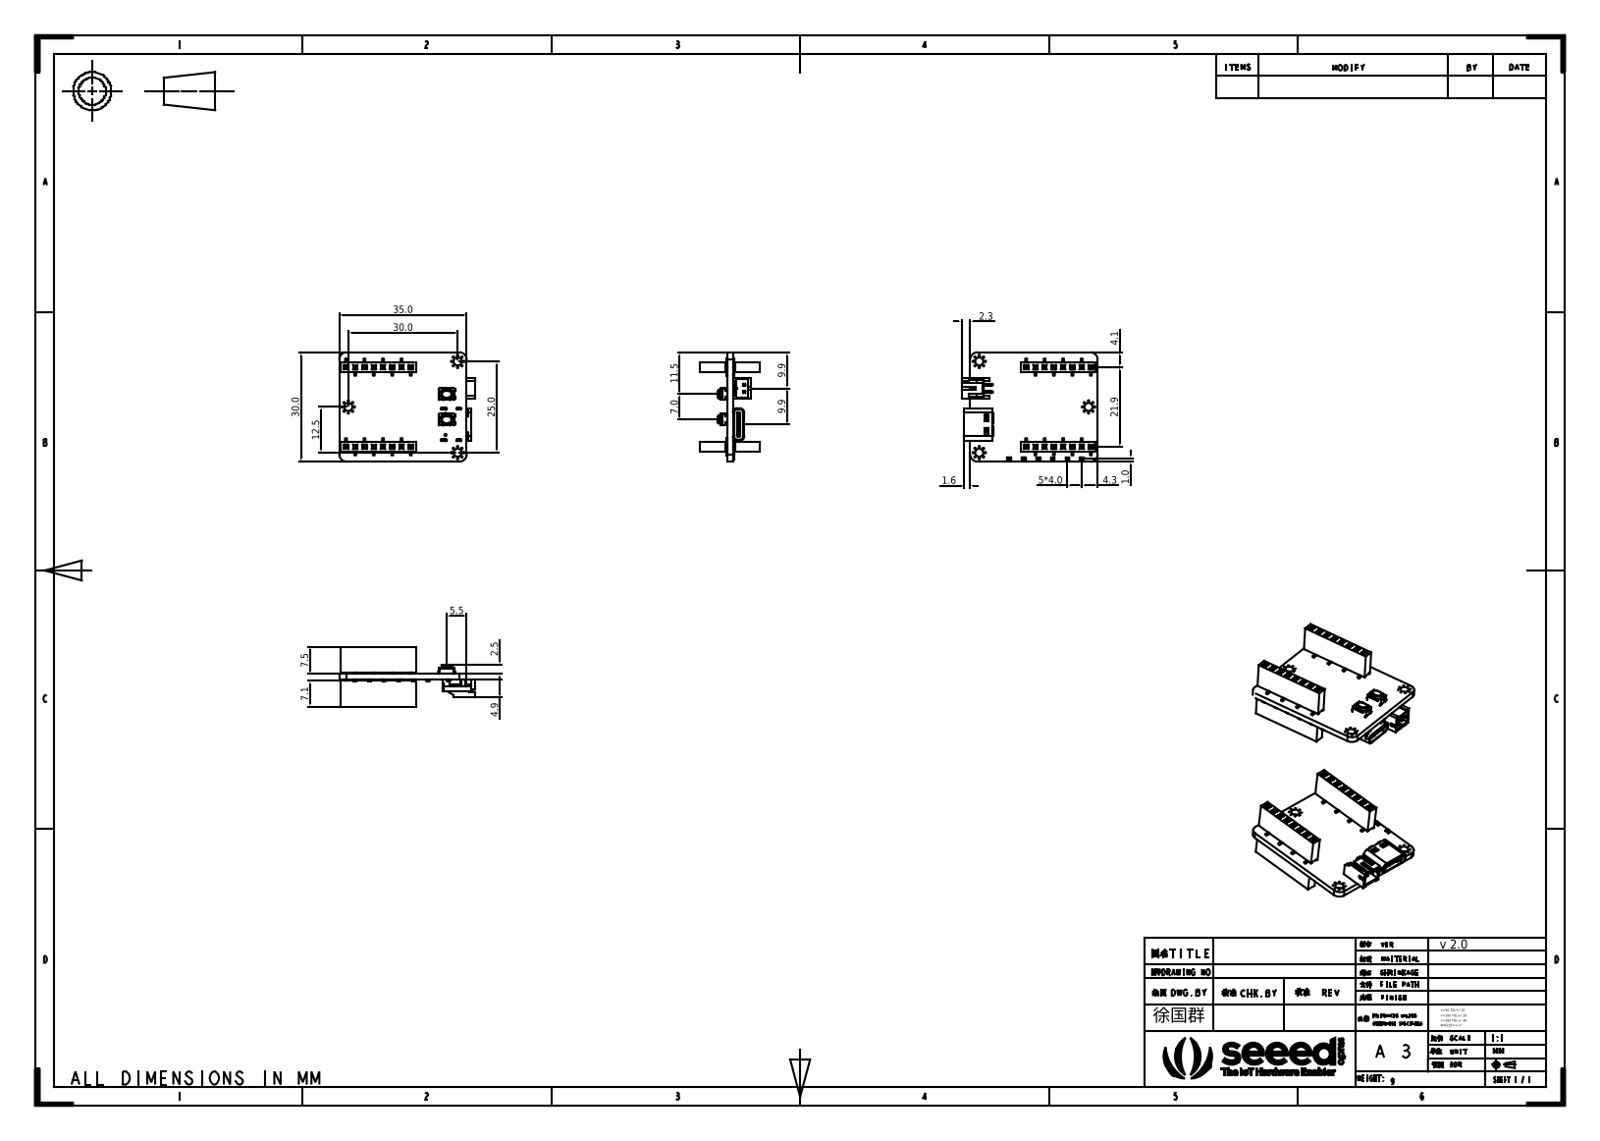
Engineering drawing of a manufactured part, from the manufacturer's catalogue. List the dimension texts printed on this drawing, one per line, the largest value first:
35.0
30.0
30.0
25.0
21.9
12.5
11.5
9.9
9.9
7.5
7.1
7.0
5.5
5*4.0
4.9
4.3
4.1
2.5
2.3
1.6
1.0
